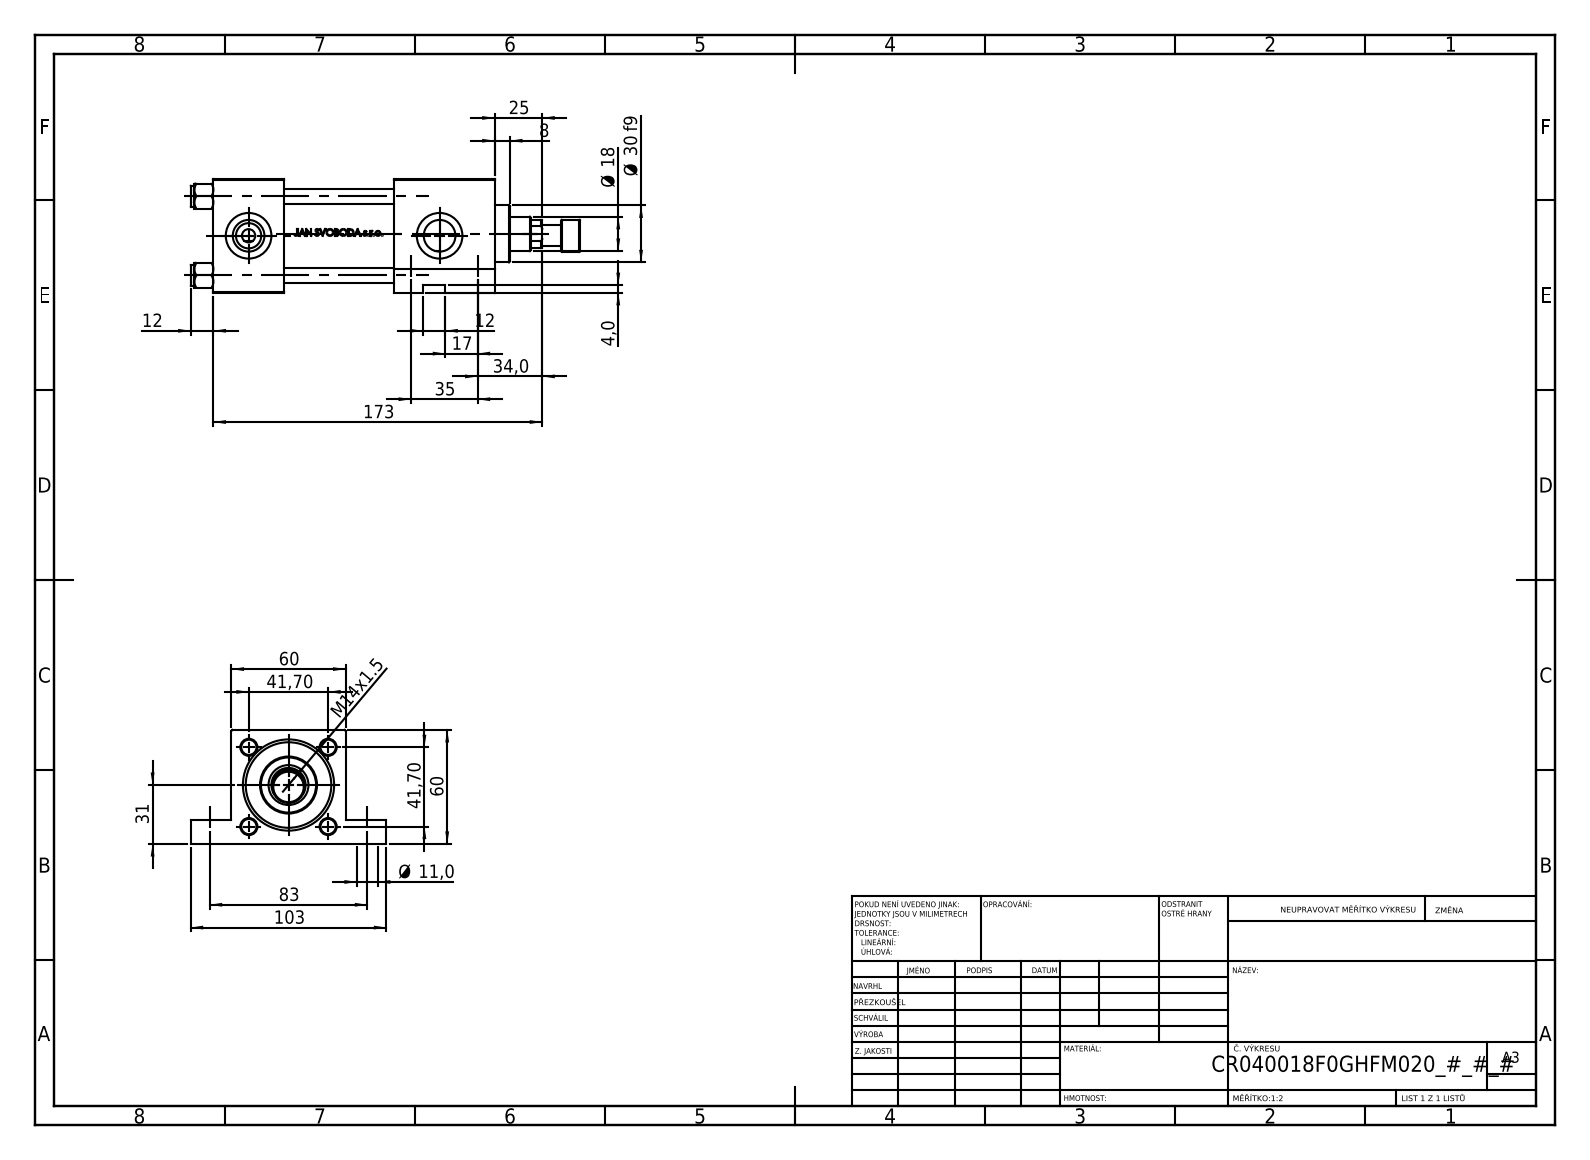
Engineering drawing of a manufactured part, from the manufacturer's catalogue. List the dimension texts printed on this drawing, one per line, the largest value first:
173
103
83
60
60
41,70
41,70
35
34,0
31
Ø 30 f9
25
Ø 18
17
M14x1.5
12
12
Ø 11,0
8
4,0
